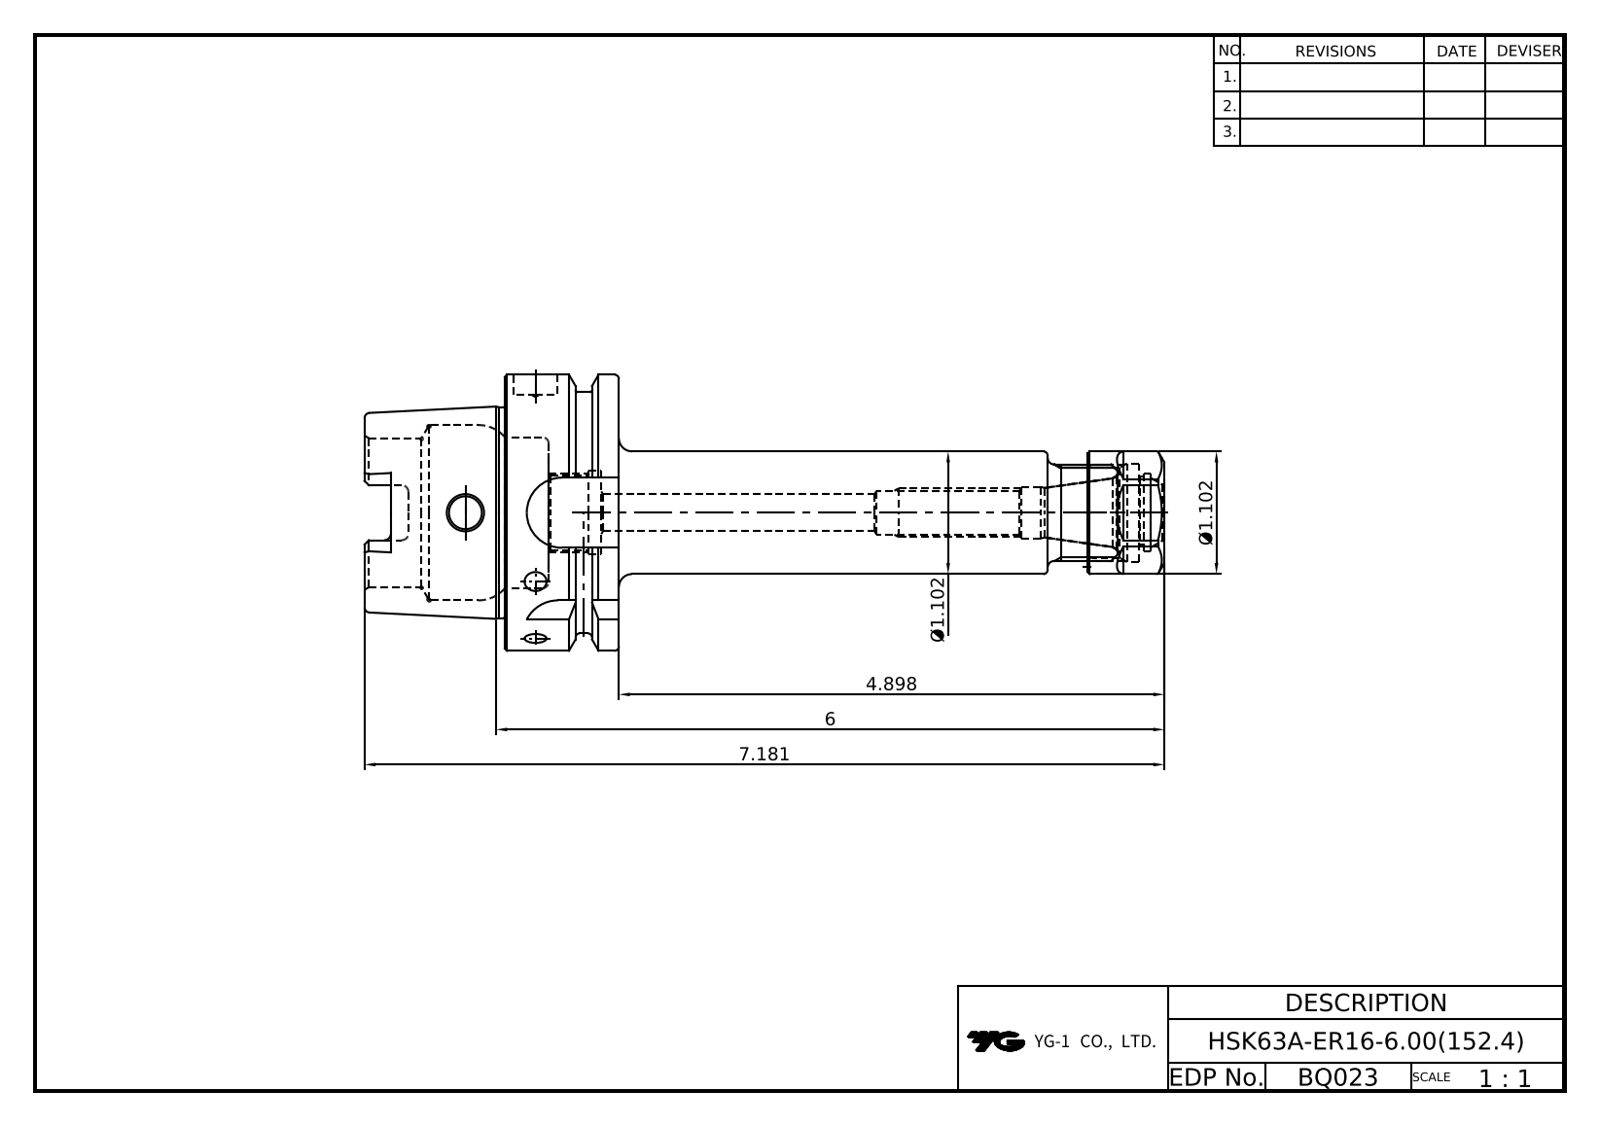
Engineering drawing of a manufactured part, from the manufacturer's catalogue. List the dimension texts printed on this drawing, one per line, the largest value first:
7.181
6
4.898
Ø1.102
Ø1.102
